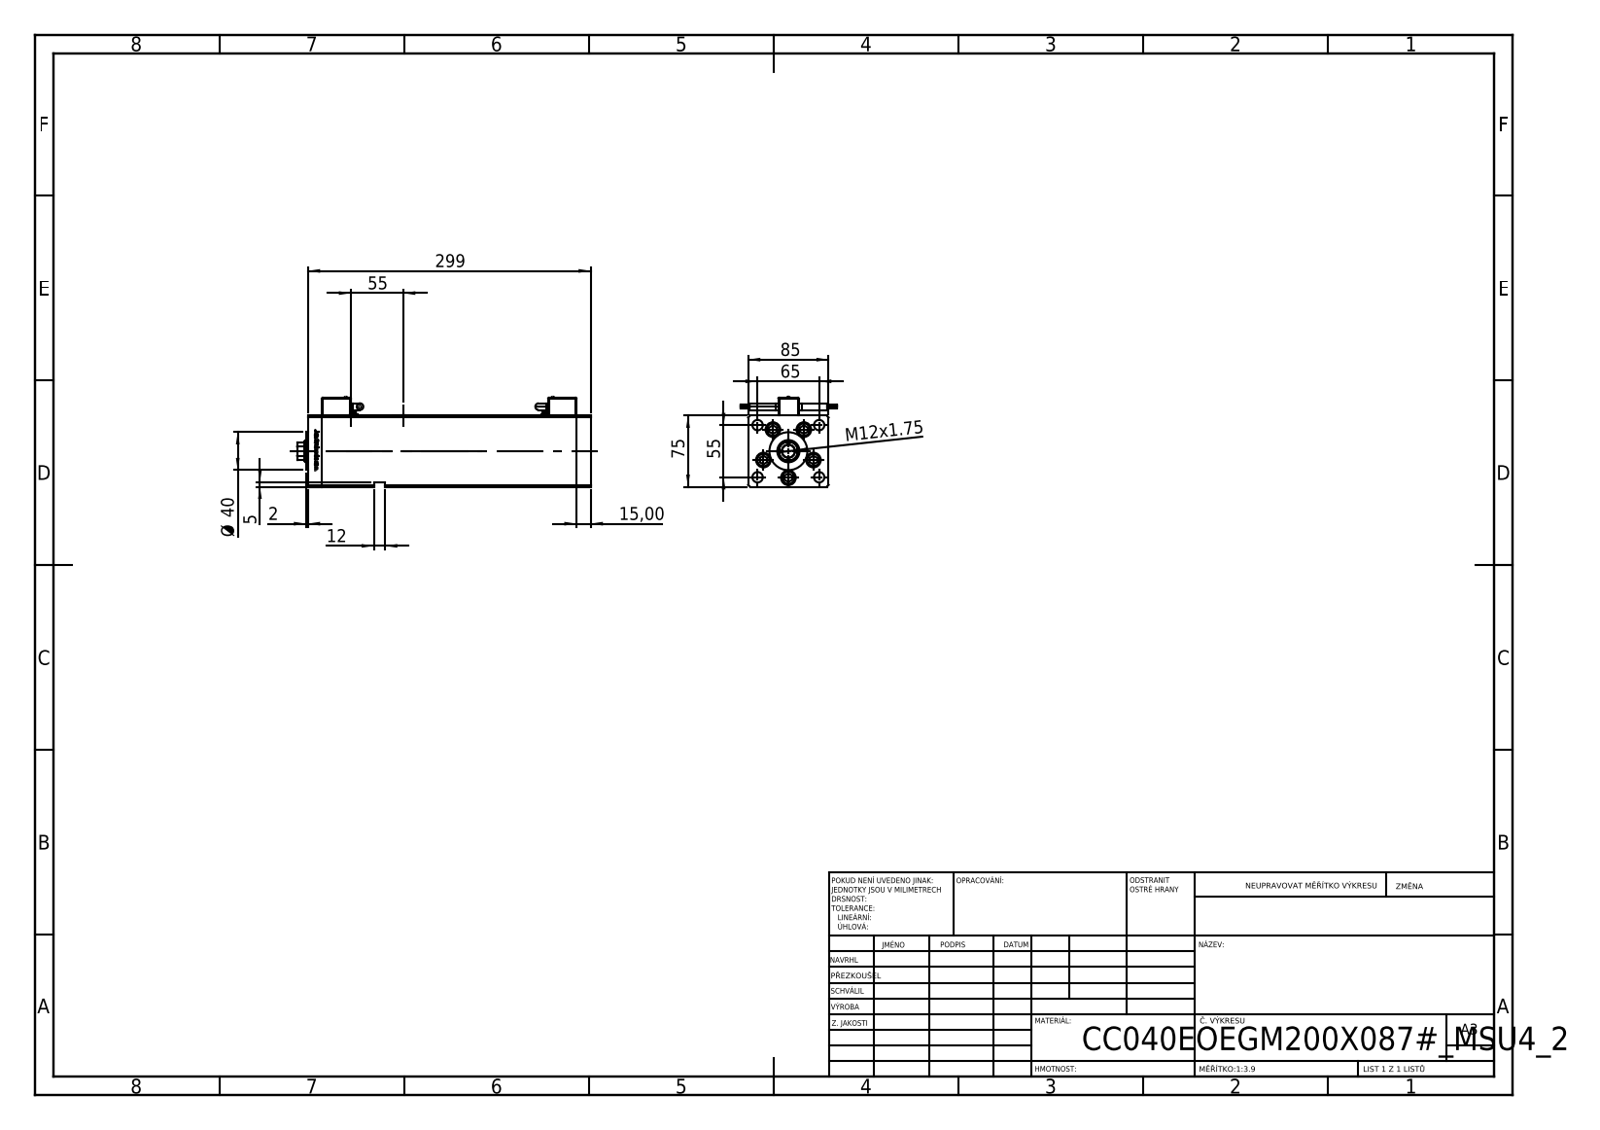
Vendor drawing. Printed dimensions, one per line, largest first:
299
85
75
65
55
55
Ø 40
15,00
12
M12x1.75
5
2
